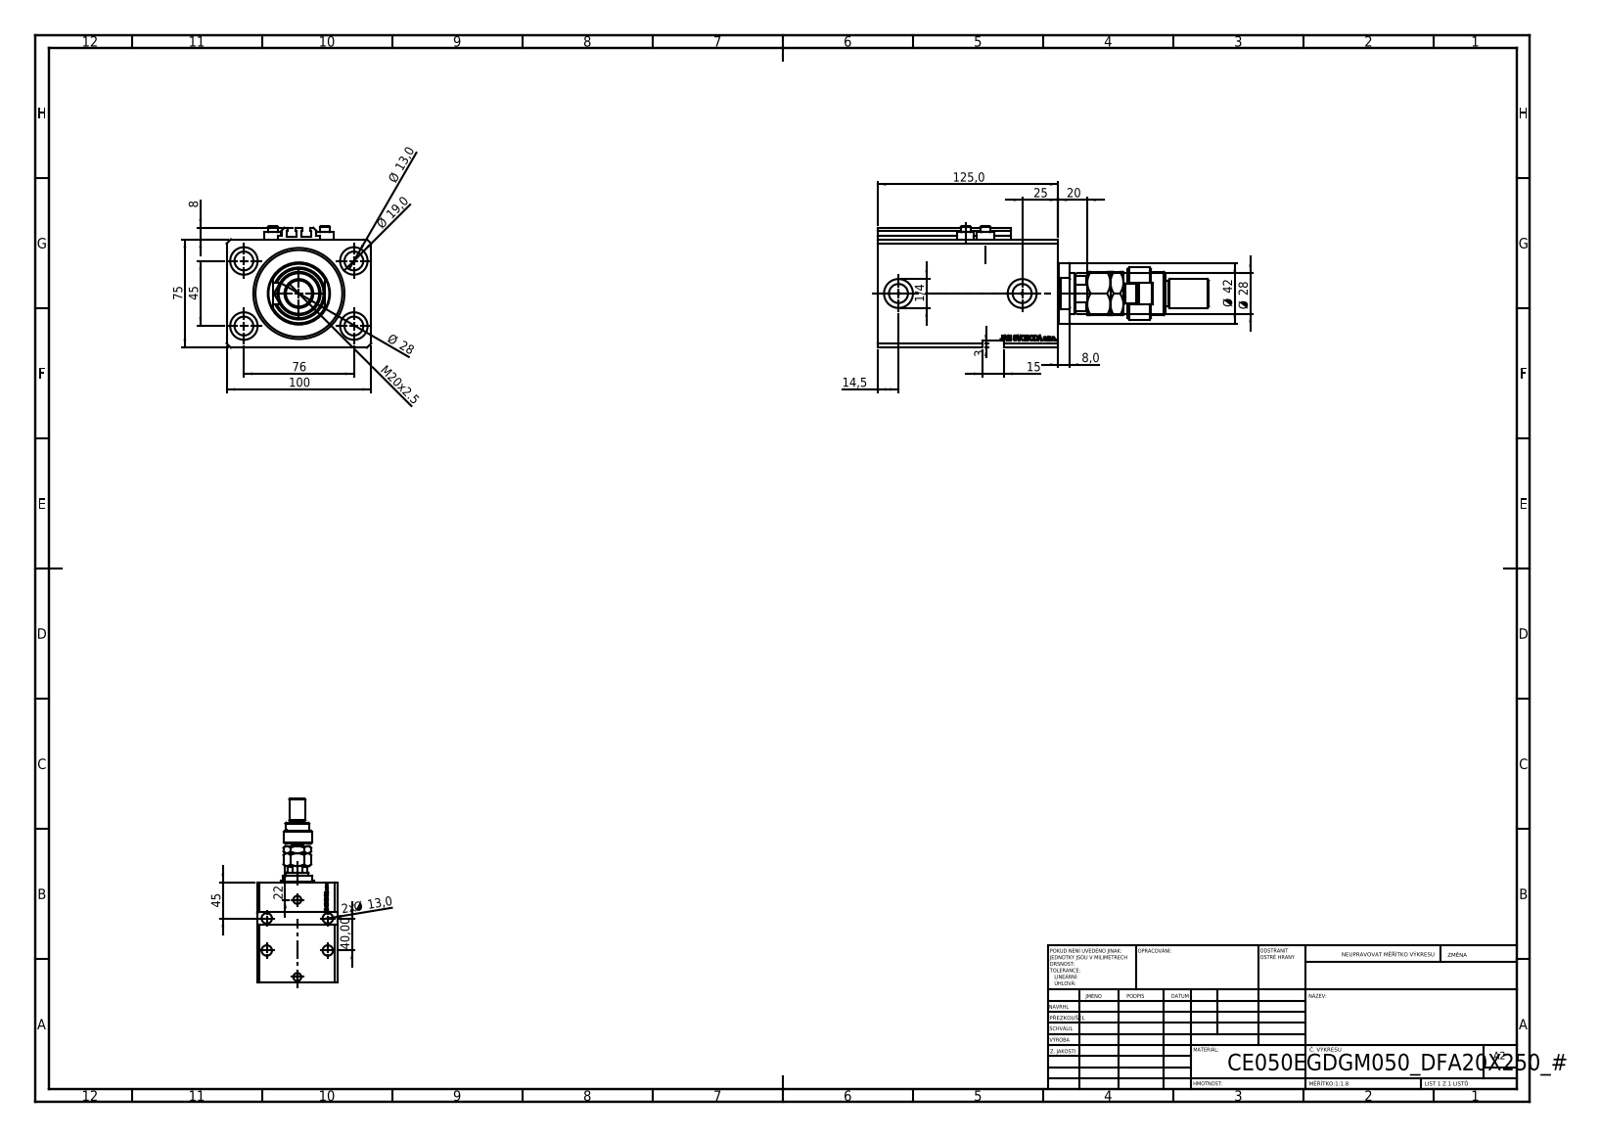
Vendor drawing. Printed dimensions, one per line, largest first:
125,0
100
76
75
45
45
Ø 42
40,00
Ø 28
Ø 28
25
22
M20x2.5
20
Ø 19,0
15
14,5
Ø 13,0
2x Ø 13,0
8
8,0
3
1/4
